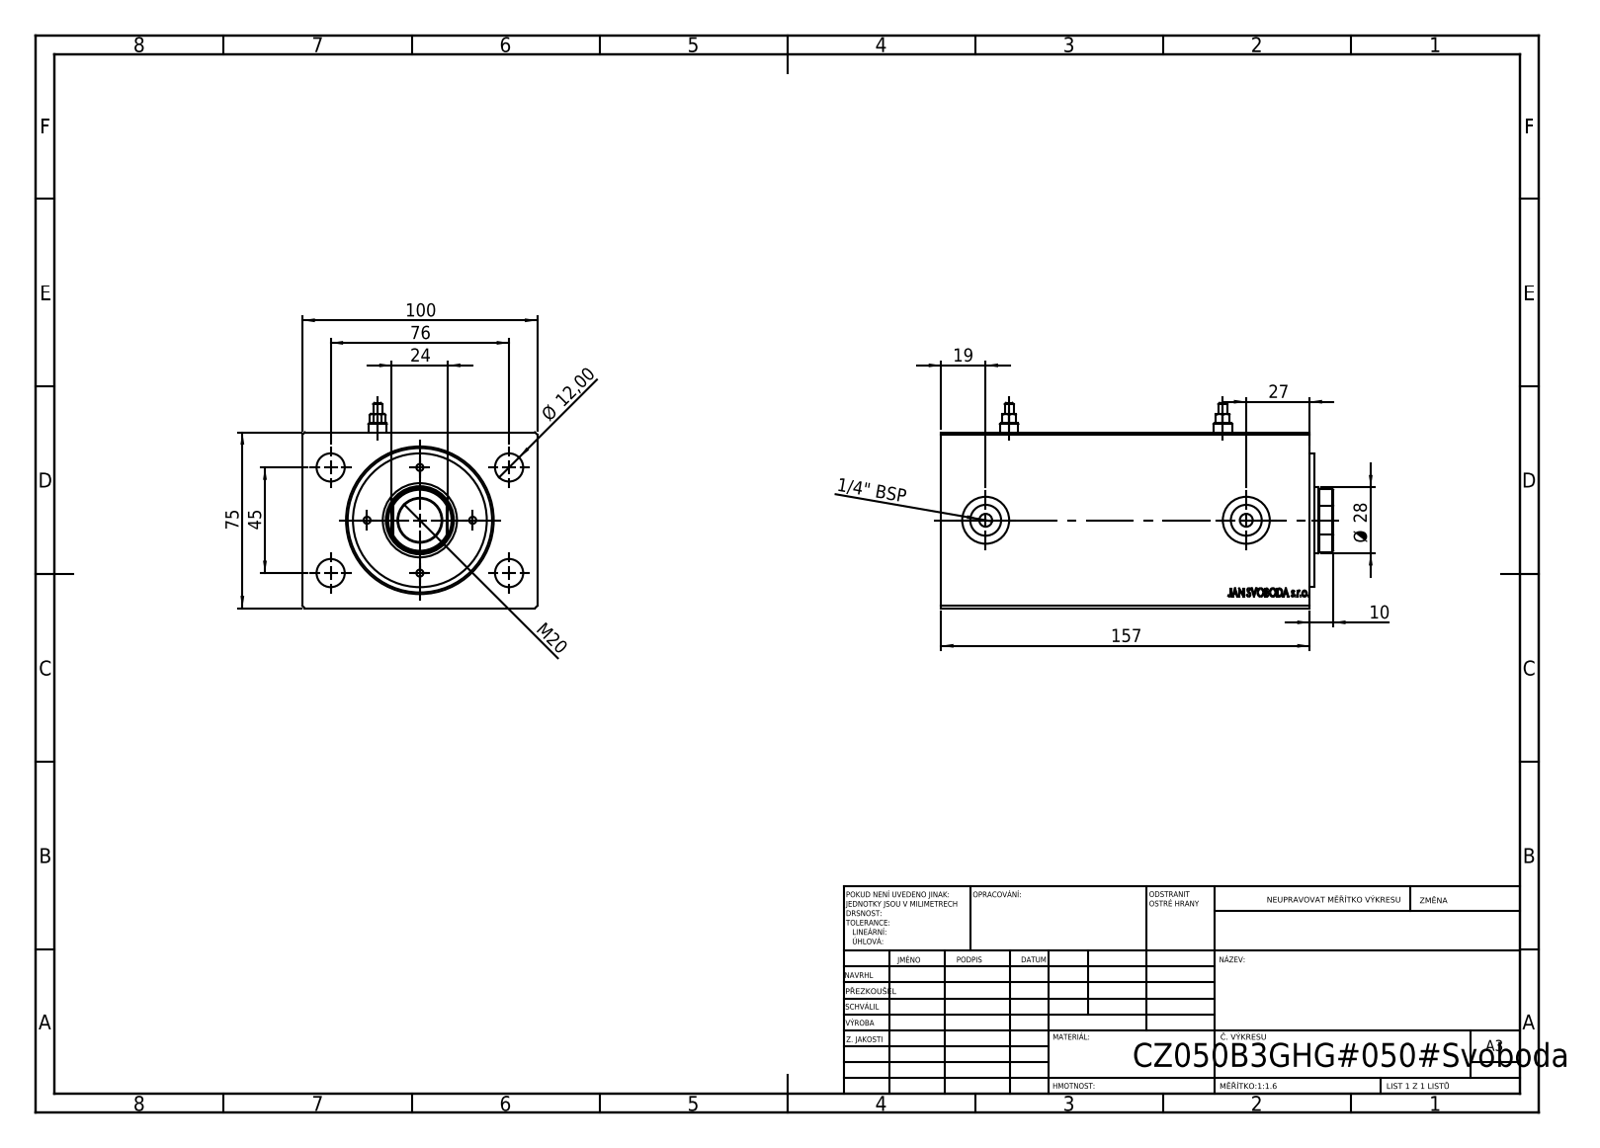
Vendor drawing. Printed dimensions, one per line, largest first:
157
100
76
75
45
Ø 28
27
24
M20
19
Ø 12,00
10
1/4" BSP
